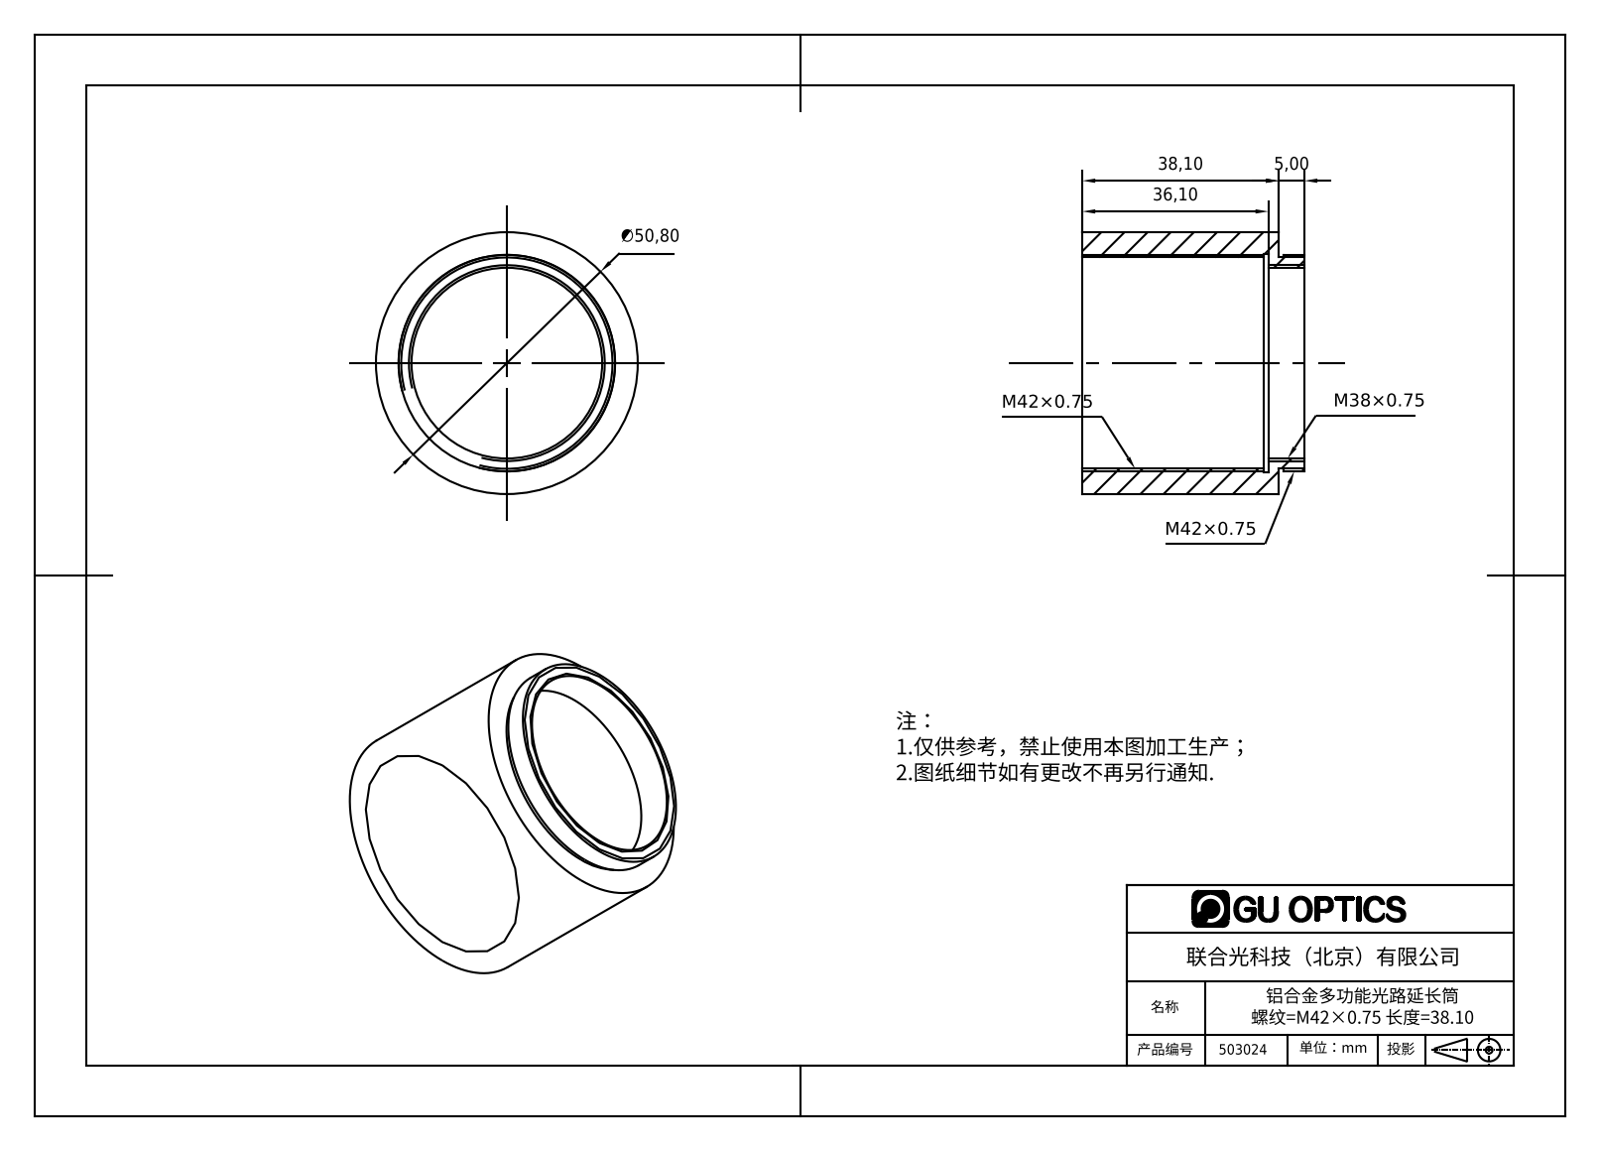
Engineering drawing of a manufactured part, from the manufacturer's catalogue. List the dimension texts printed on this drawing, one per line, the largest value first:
∅50,80
38,10
36,10
5,00
